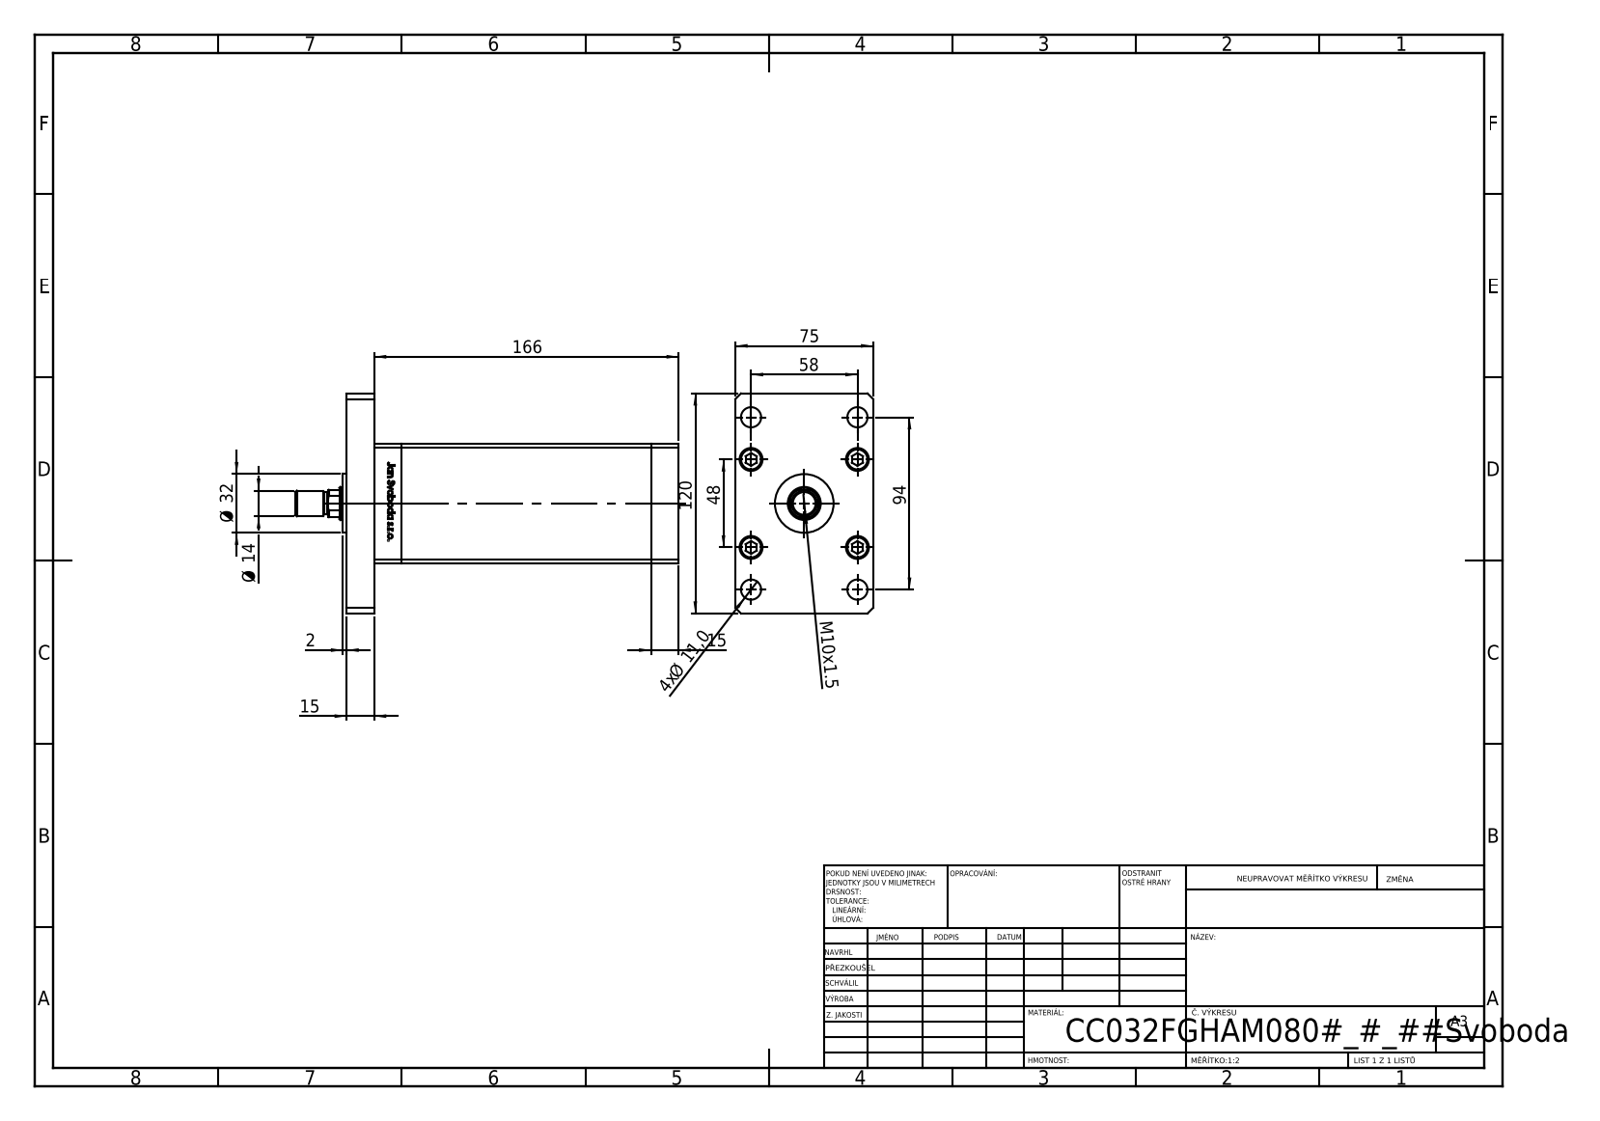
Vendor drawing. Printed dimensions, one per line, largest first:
166
120
94
75
58
48
Ø 32
15
15
Ø 14
4x Ø 11,0
M10x1.5
2
